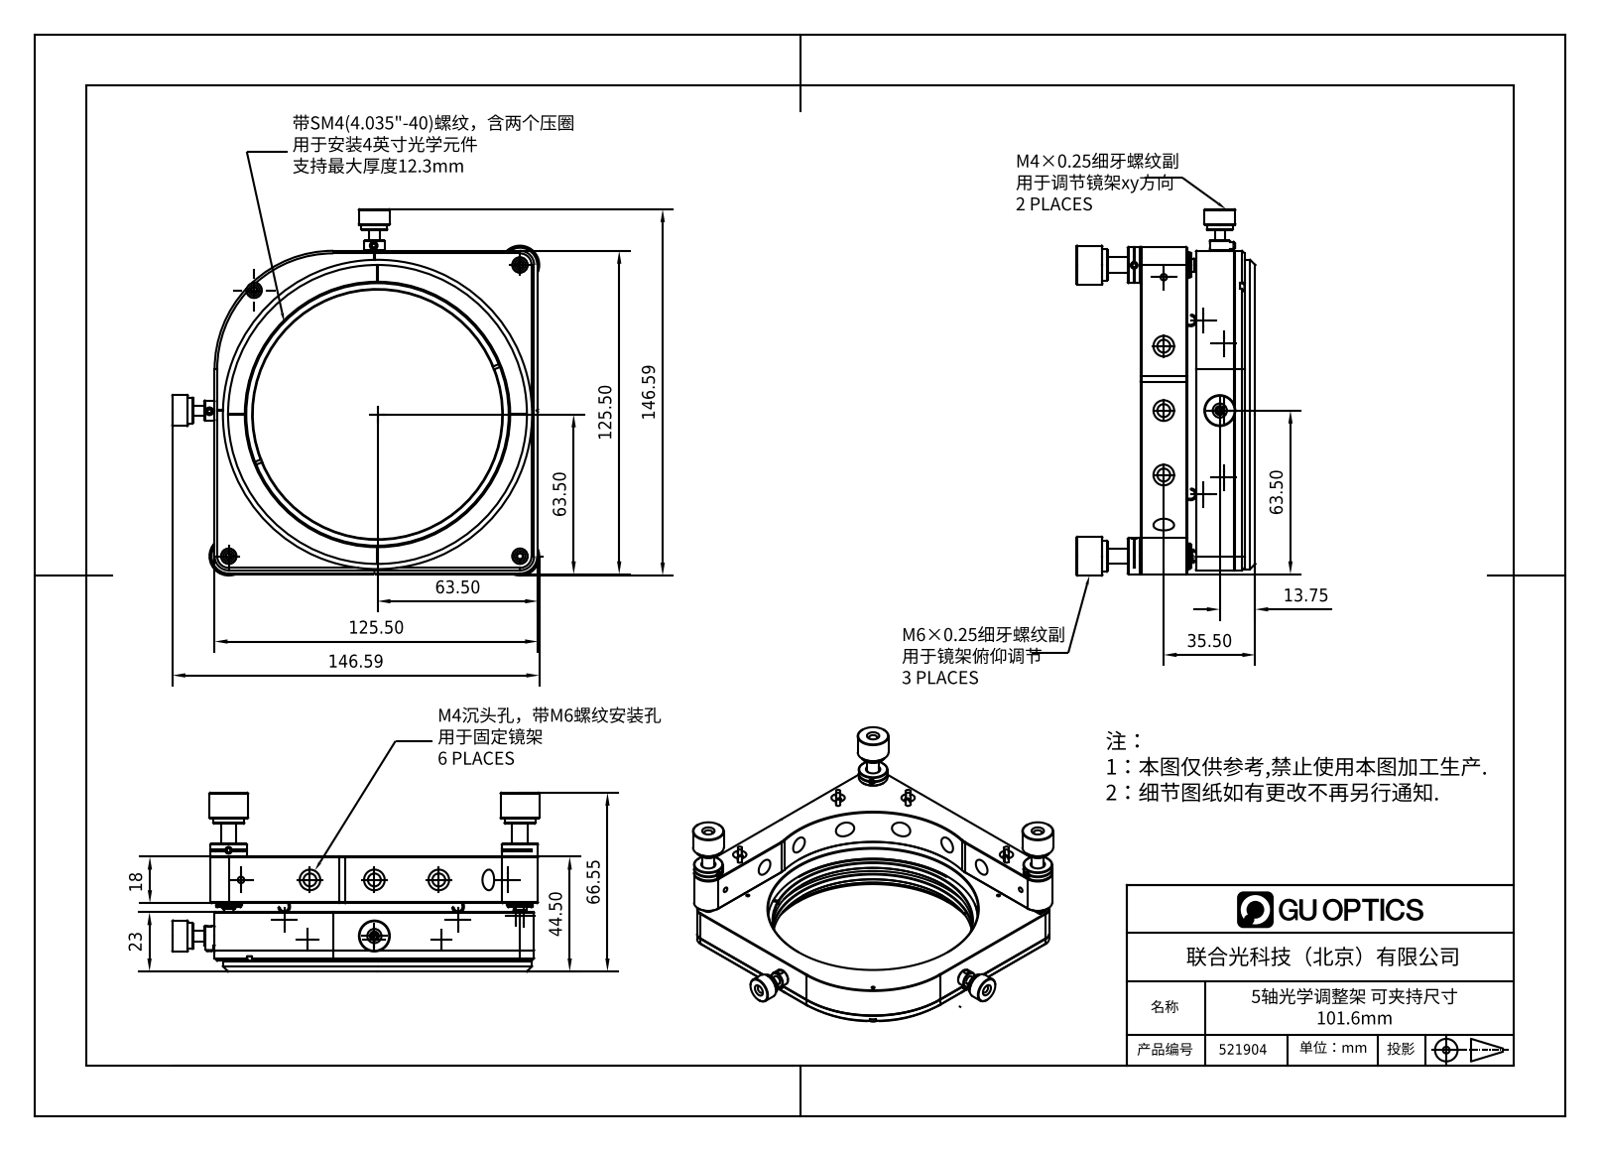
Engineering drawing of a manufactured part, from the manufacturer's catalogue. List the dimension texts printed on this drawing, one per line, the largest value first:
146.59
146.59
125.50
125.50
66.55
63.50
63.50
63.50
44.50
35.50
23
18
13.75
